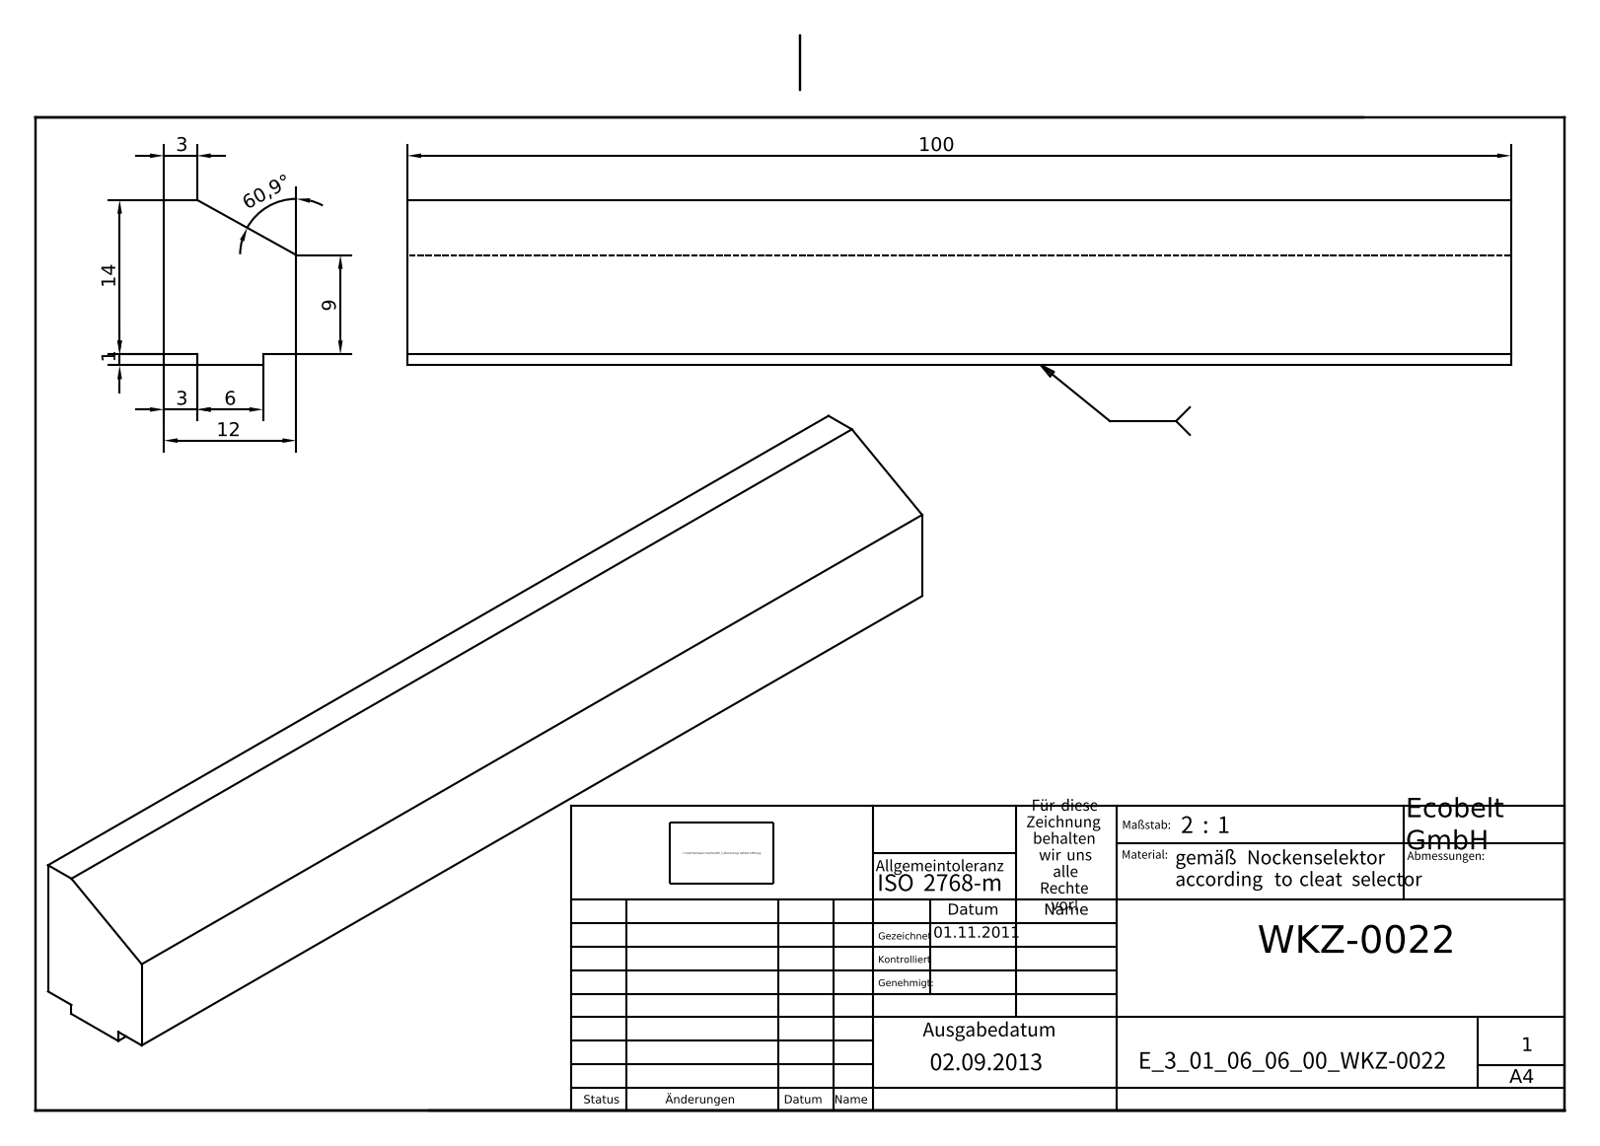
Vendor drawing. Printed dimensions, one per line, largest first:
100
60,9°
14
12
9
6
3
3
1
